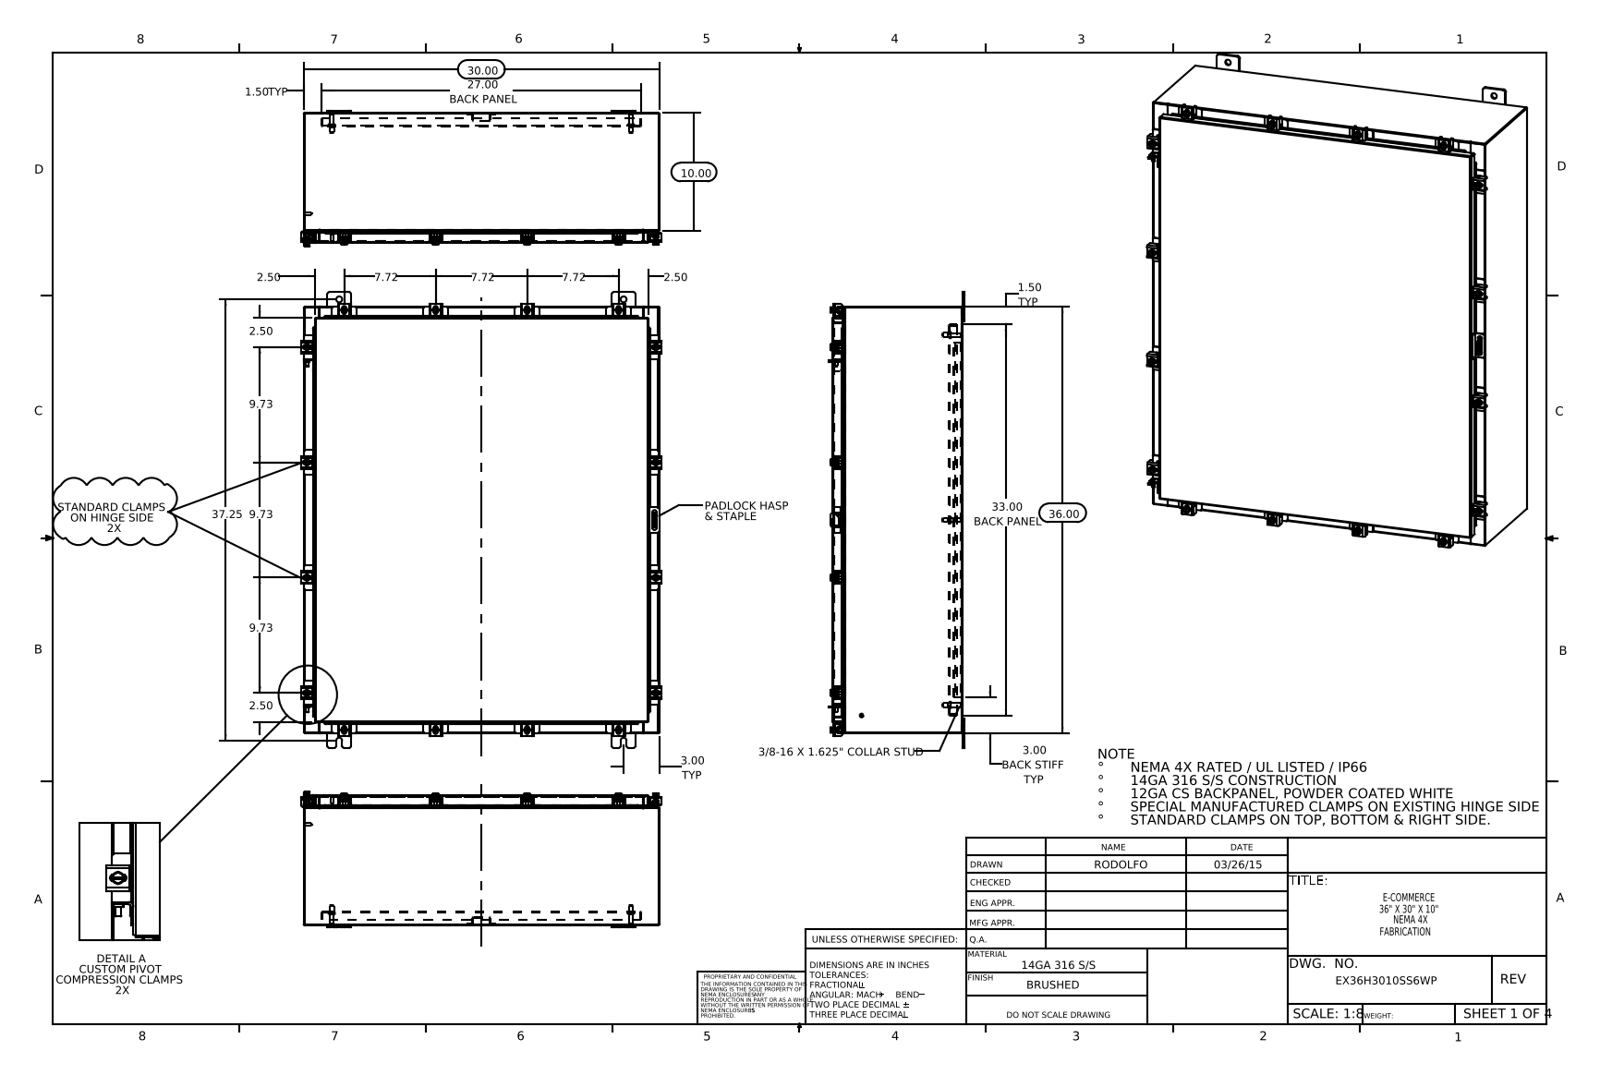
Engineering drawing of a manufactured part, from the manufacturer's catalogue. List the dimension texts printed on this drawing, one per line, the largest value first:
37.25
36.00
33.00 BACK PANEL
30.00
27.00 BACK PANEL
10.00
9.73
9.73
9.73
7.72
7.72
7.72
3.00 TYP
3.00 BACK STIFF TYP
2.50
2.50
2.50
2.50
1.50 TYP
1.50 TYP
